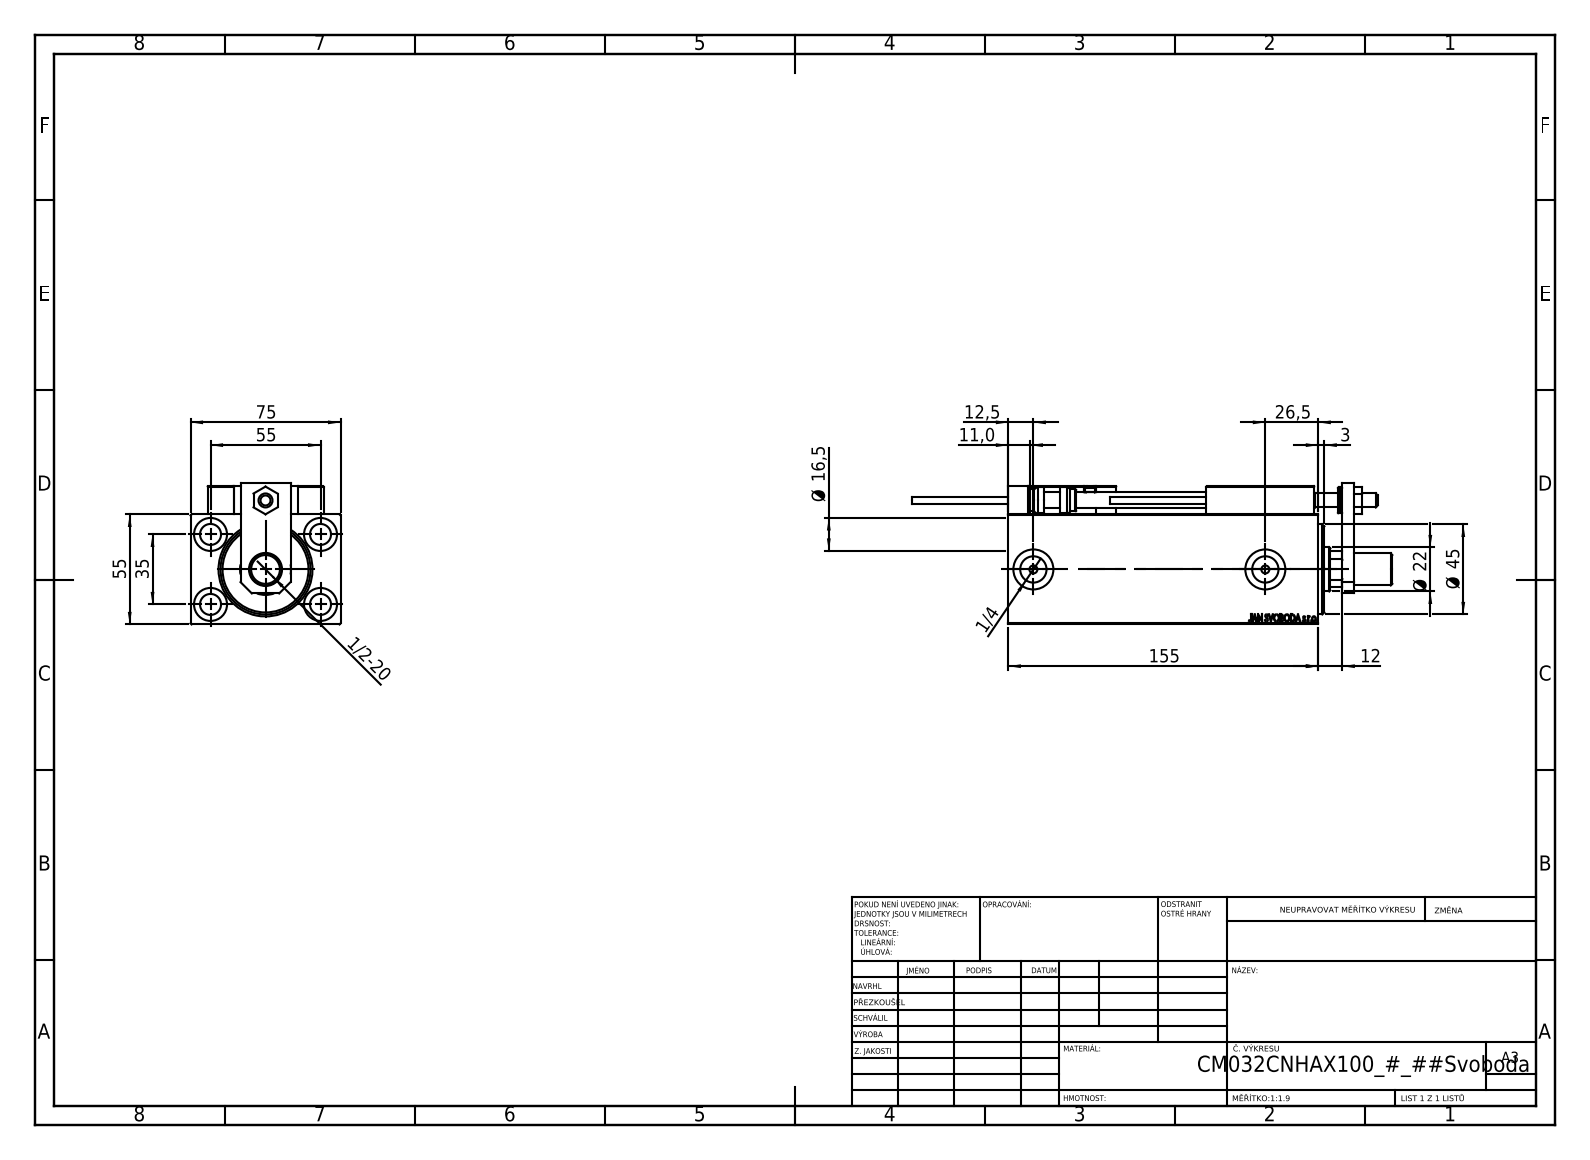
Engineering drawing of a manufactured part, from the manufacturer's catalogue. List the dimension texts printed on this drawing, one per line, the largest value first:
155
75
55
55
Ø 45
35
26,5
Ø 22
Ø 16,5
12,5
12
11,0
3
1/2-20
1/4
